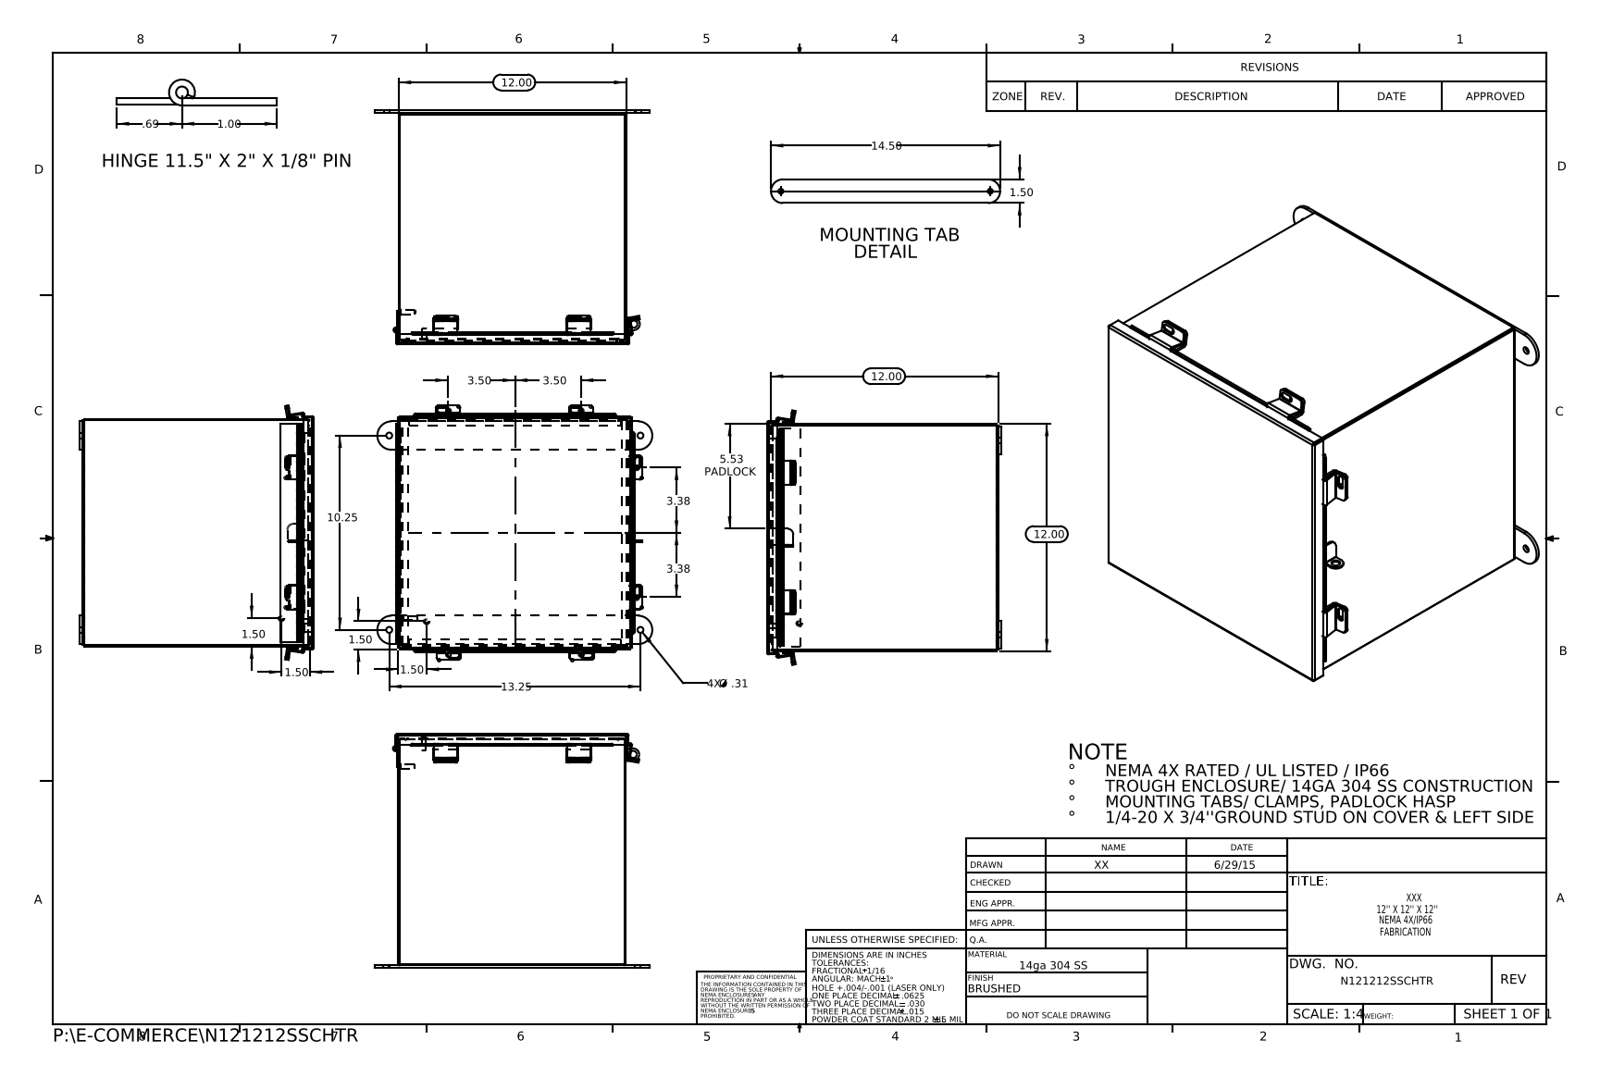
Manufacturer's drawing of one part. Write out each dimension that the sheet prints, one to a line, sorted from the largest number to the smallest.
14.50
13.25
12.00
12.00
12.00
10.25
5.53 PADLOCK
3.50
3.50
3.38
3.38
1.50
1.50
1.50
1.50
1.50
1.00
.69
4X Ø .31
